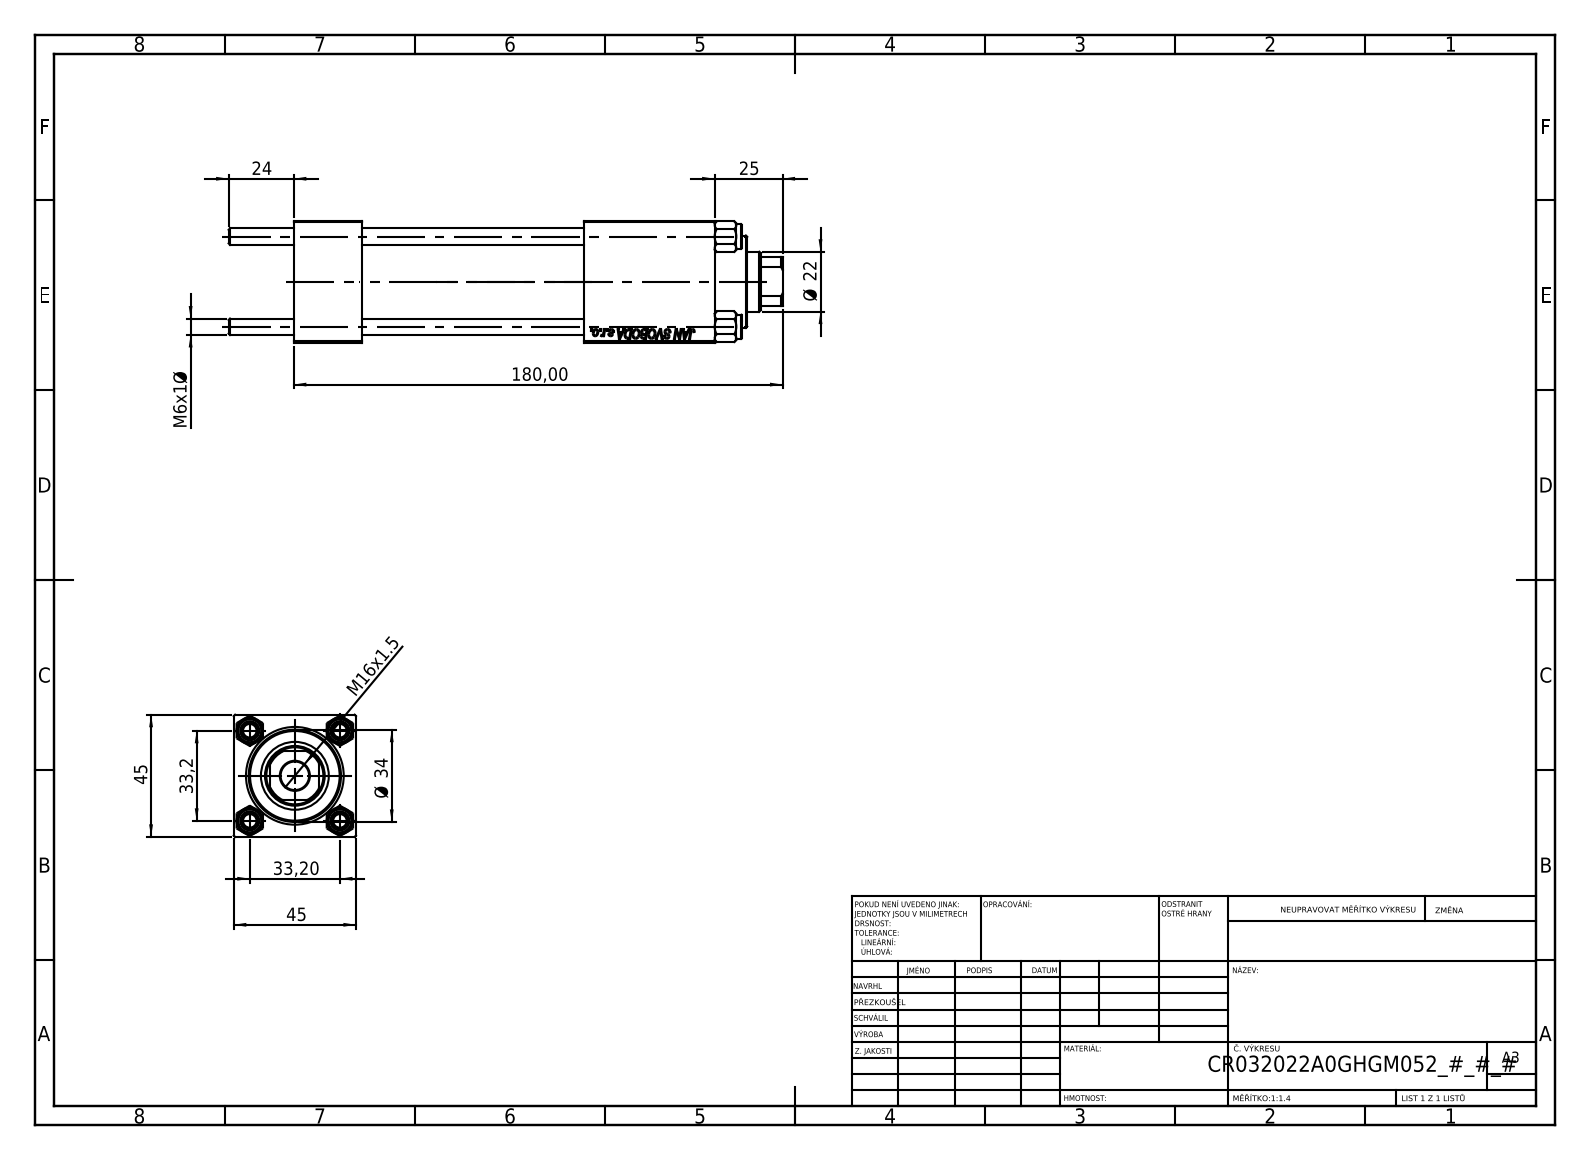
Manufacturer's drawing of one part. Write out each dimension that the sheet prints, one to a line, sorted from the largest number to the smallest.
180,00
45
45
Ø 34
33,2
33,20
25
24
Ø 22
M16x1.5
M6x1 Ø
